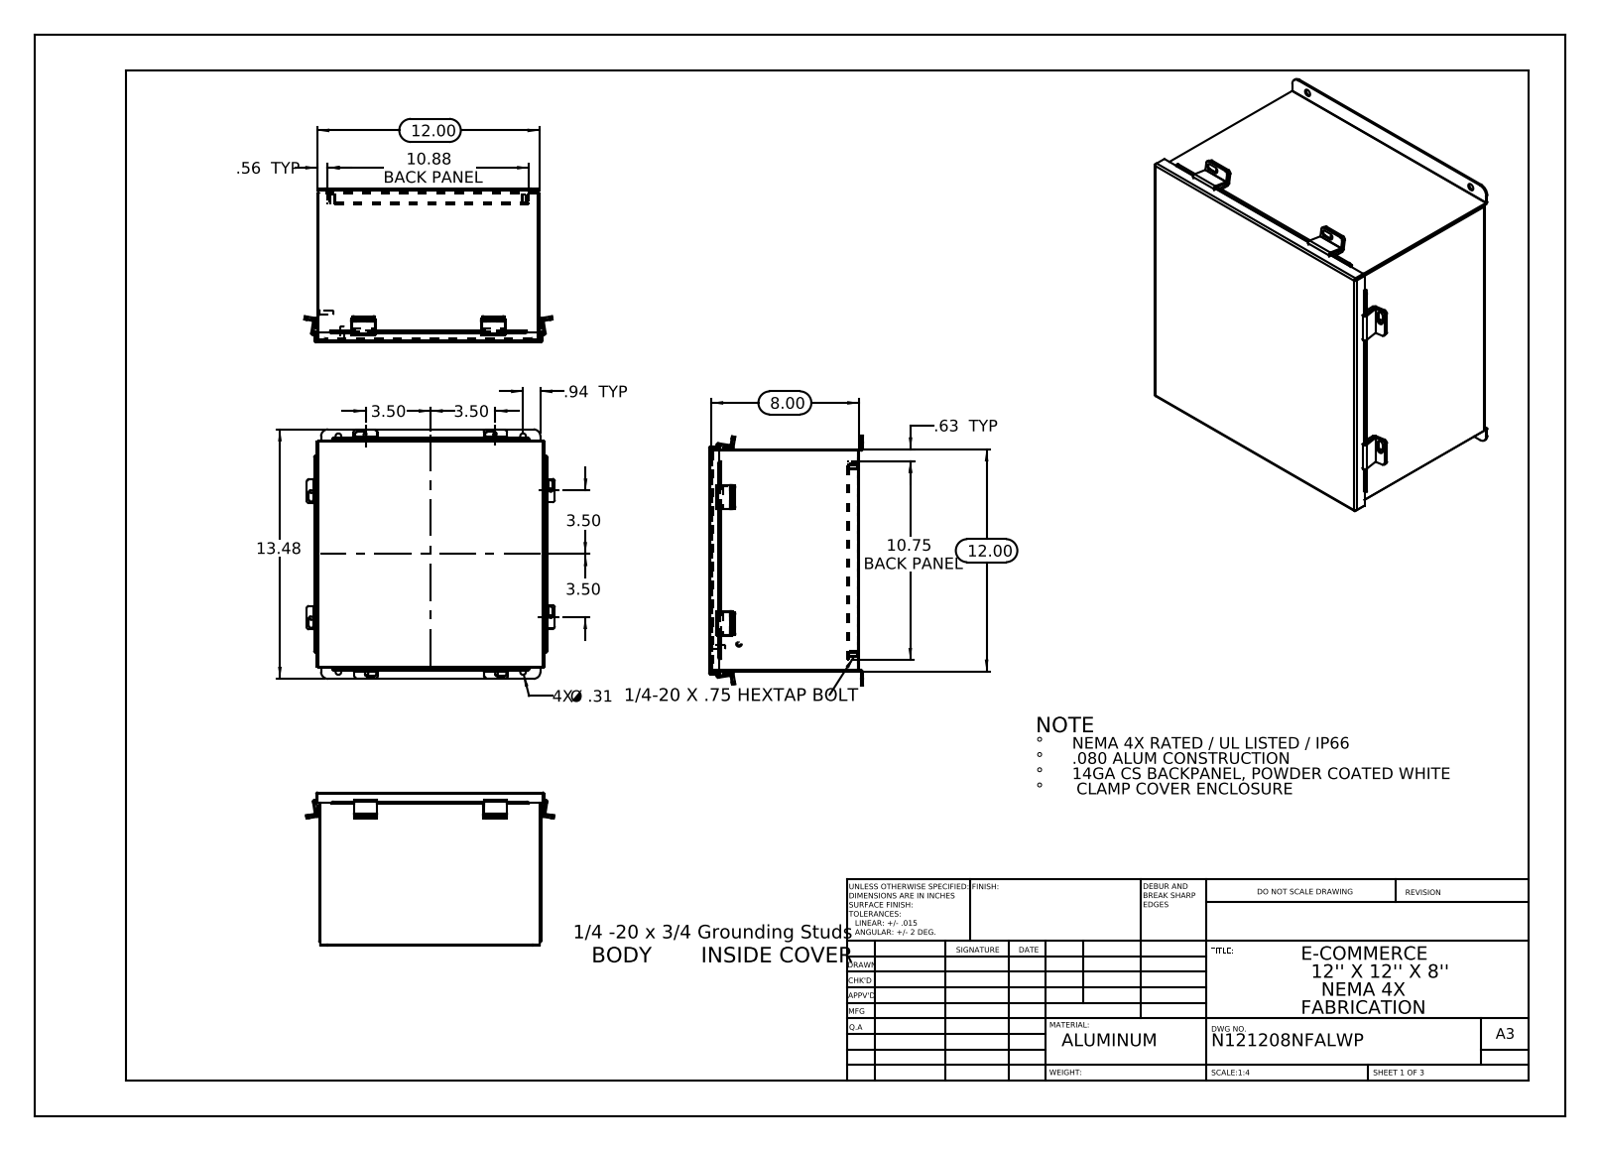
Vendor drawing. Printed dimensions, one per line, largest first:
13.48
12.00
12.00
10.88 BACK PANEL
10.75 BACK PANEL
8.00
3.50
3.50
3.50
3.50
.94 TYP
.63 TYP
.56 TYP
4X Ø .31
